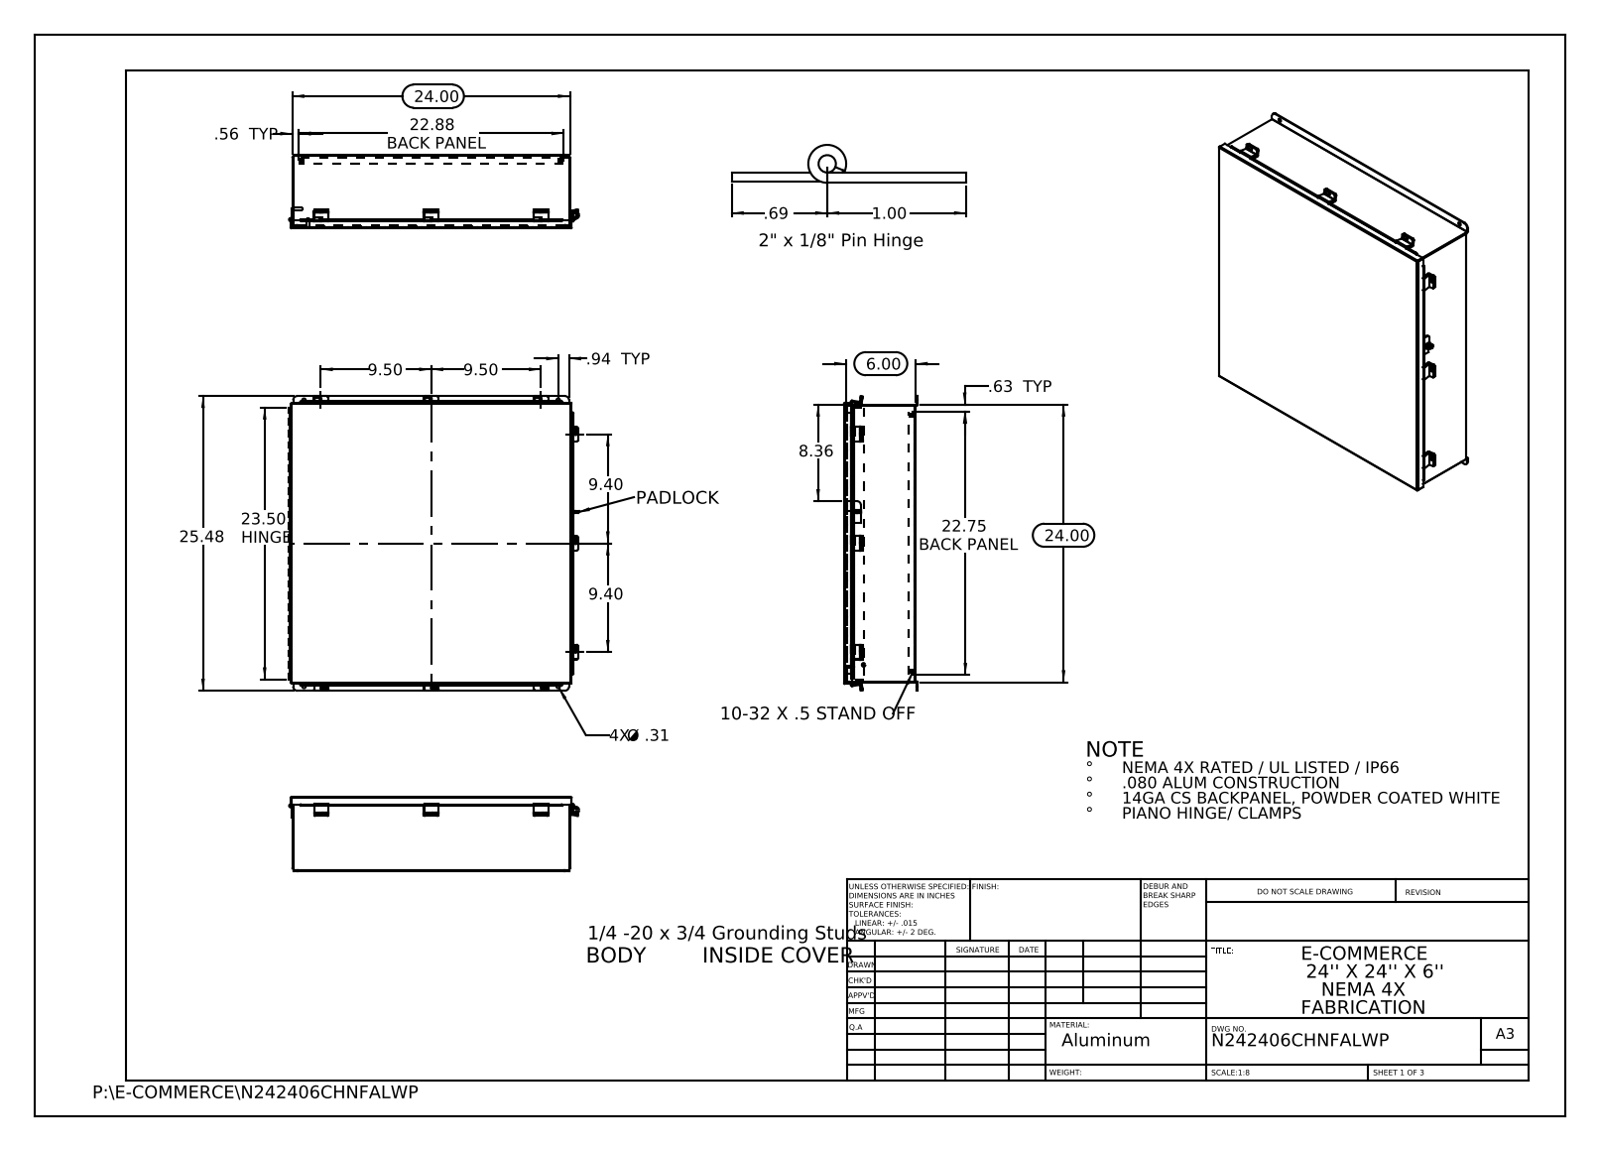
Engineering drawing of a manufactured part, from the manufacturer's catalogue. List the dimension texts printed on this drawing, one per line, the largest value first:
25.48
24.00
24.00
23.50 HINGE
22.88 BACK PANEL
22.75 BACK PANEL
9.50
9.50
9.40
9.40
8.36
6.00
1.00
.94 TYP
.69
.63 TYP
.56 TYP
4X Ø .31
